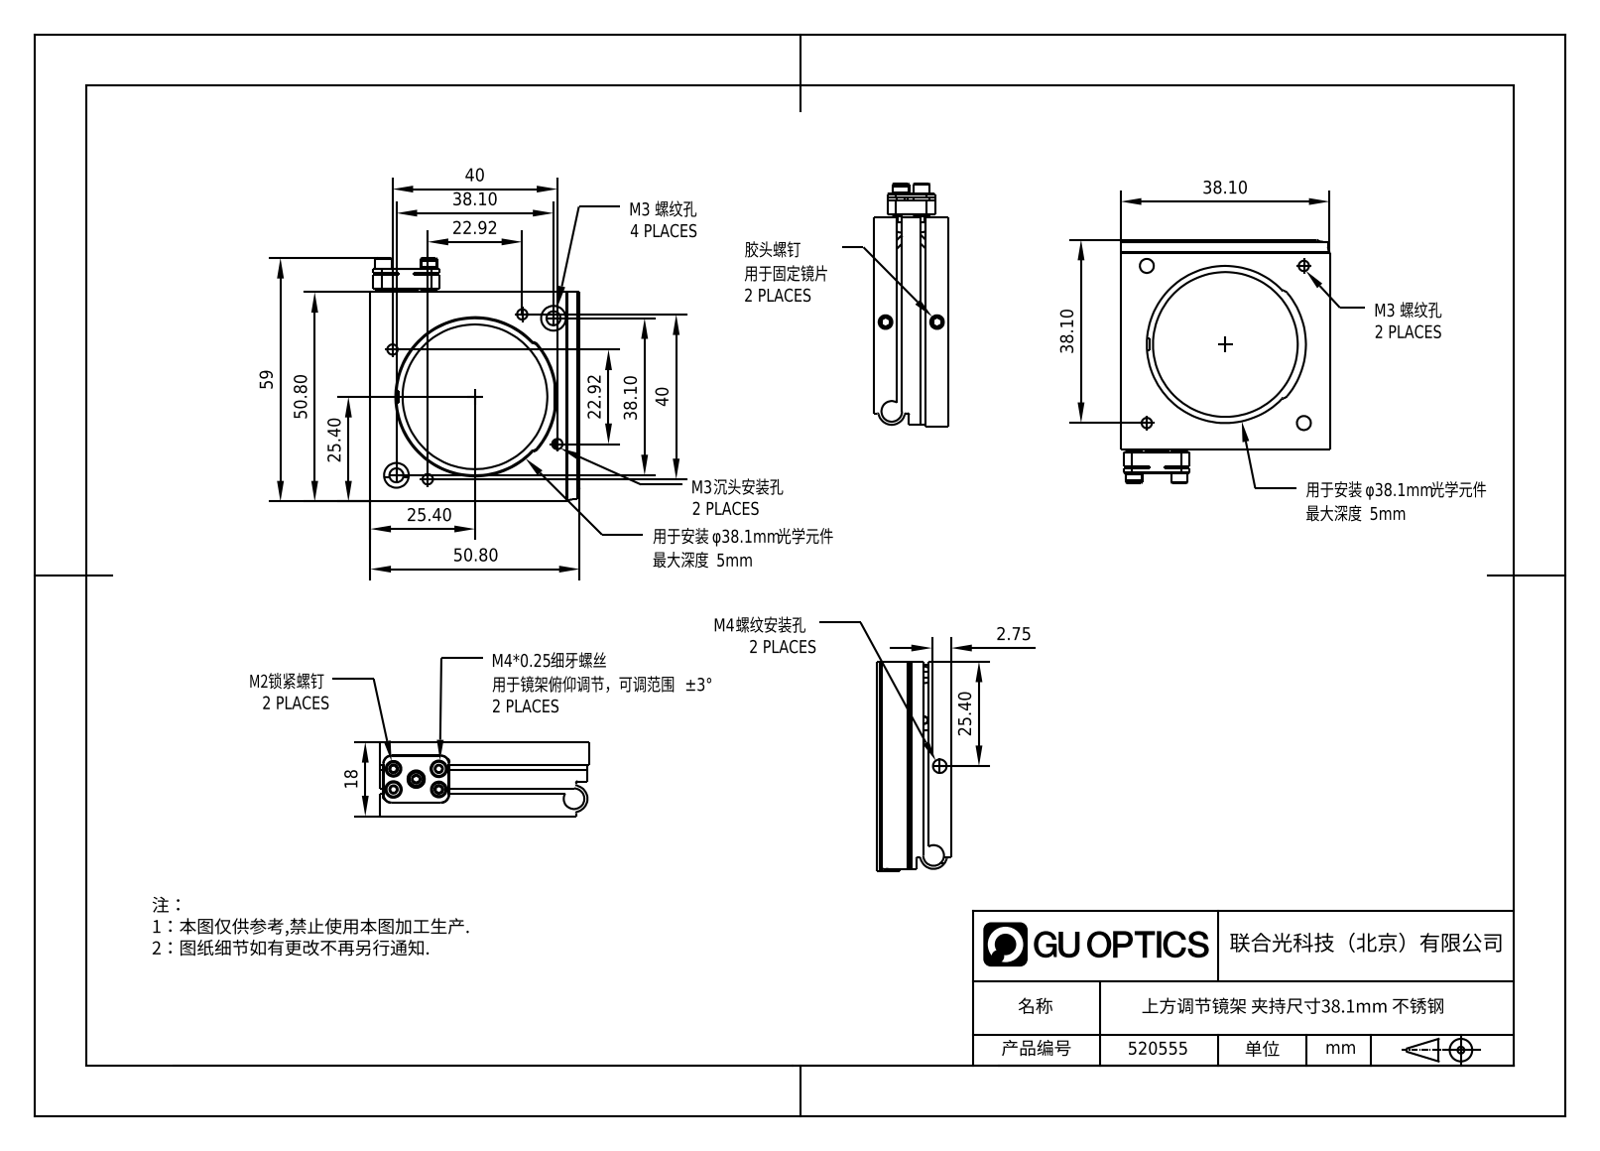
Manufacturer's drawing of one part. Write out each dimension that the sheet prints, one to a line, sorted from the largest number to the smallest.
59
50.80
50.80
40
40
38.10
38.10
38.10
38.10
25.40
25.40
25.40
22.92
22.92
18
2.75
